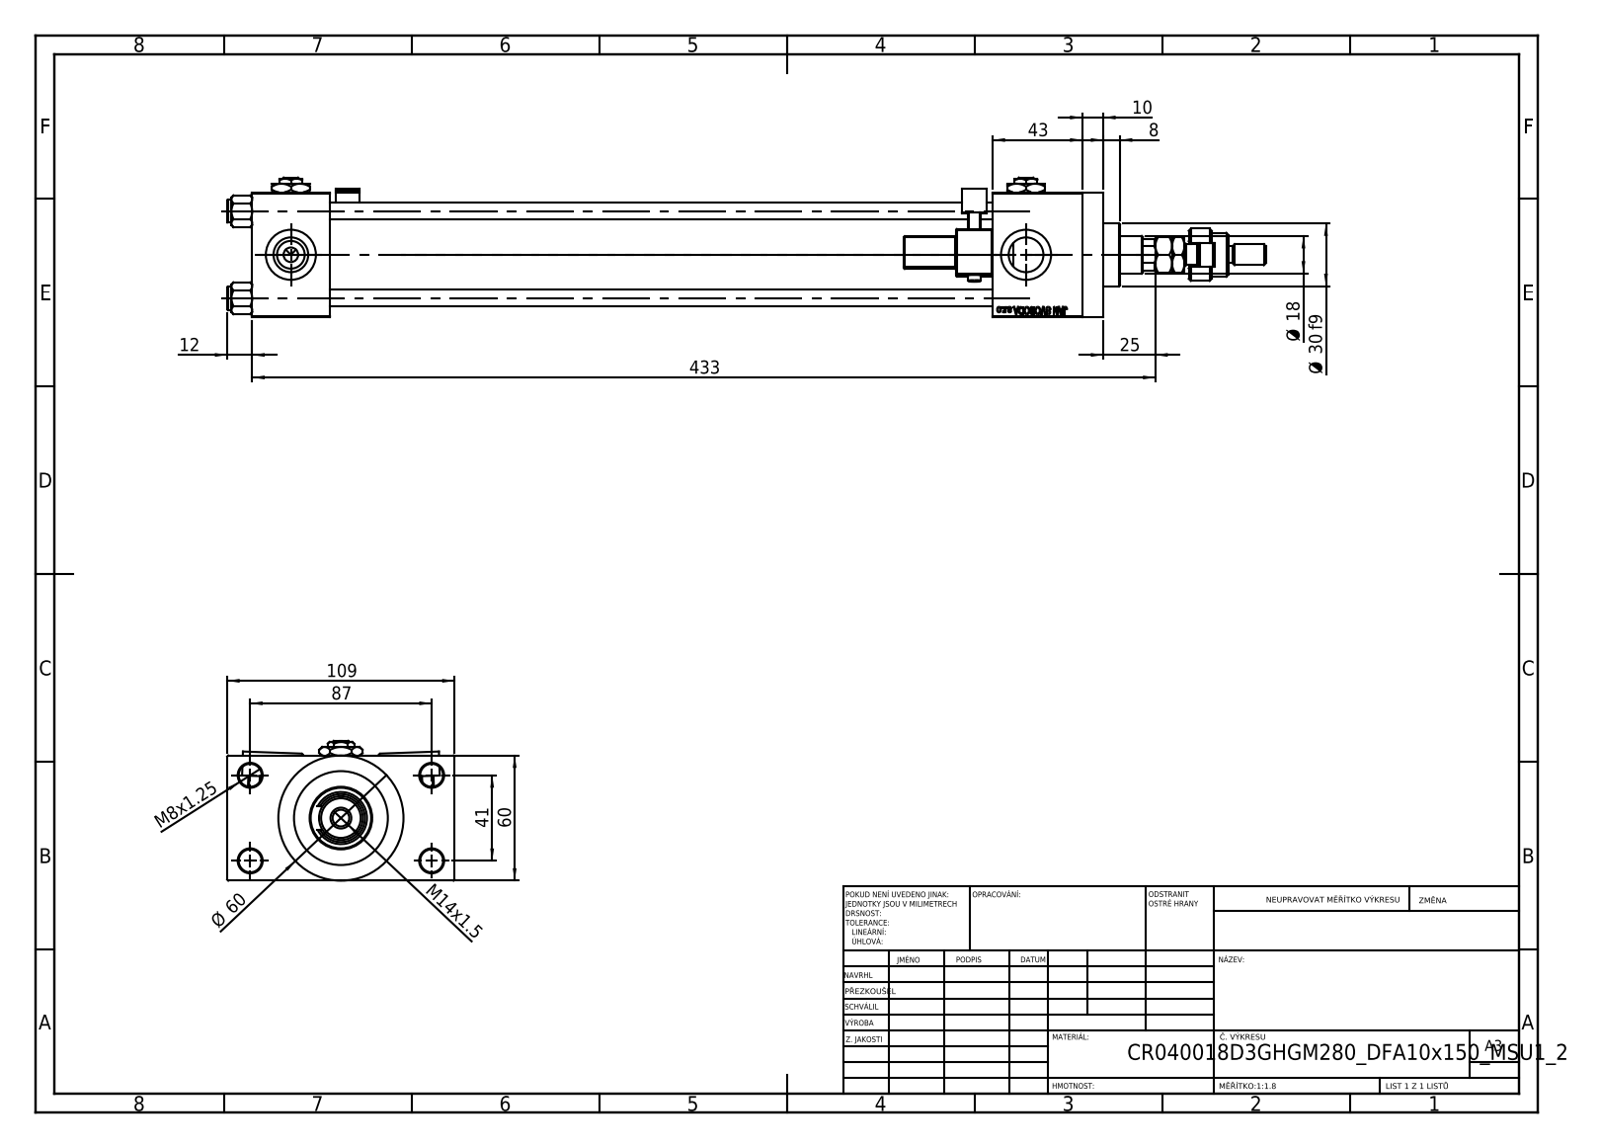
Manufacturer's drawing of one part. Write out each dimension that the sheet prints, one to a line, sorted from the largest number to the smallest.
433
109
87
Ø 60
60
43
41
Ø 30 f9
25
Ø 18
M14x1.5
12
10
8
M8x1.25
